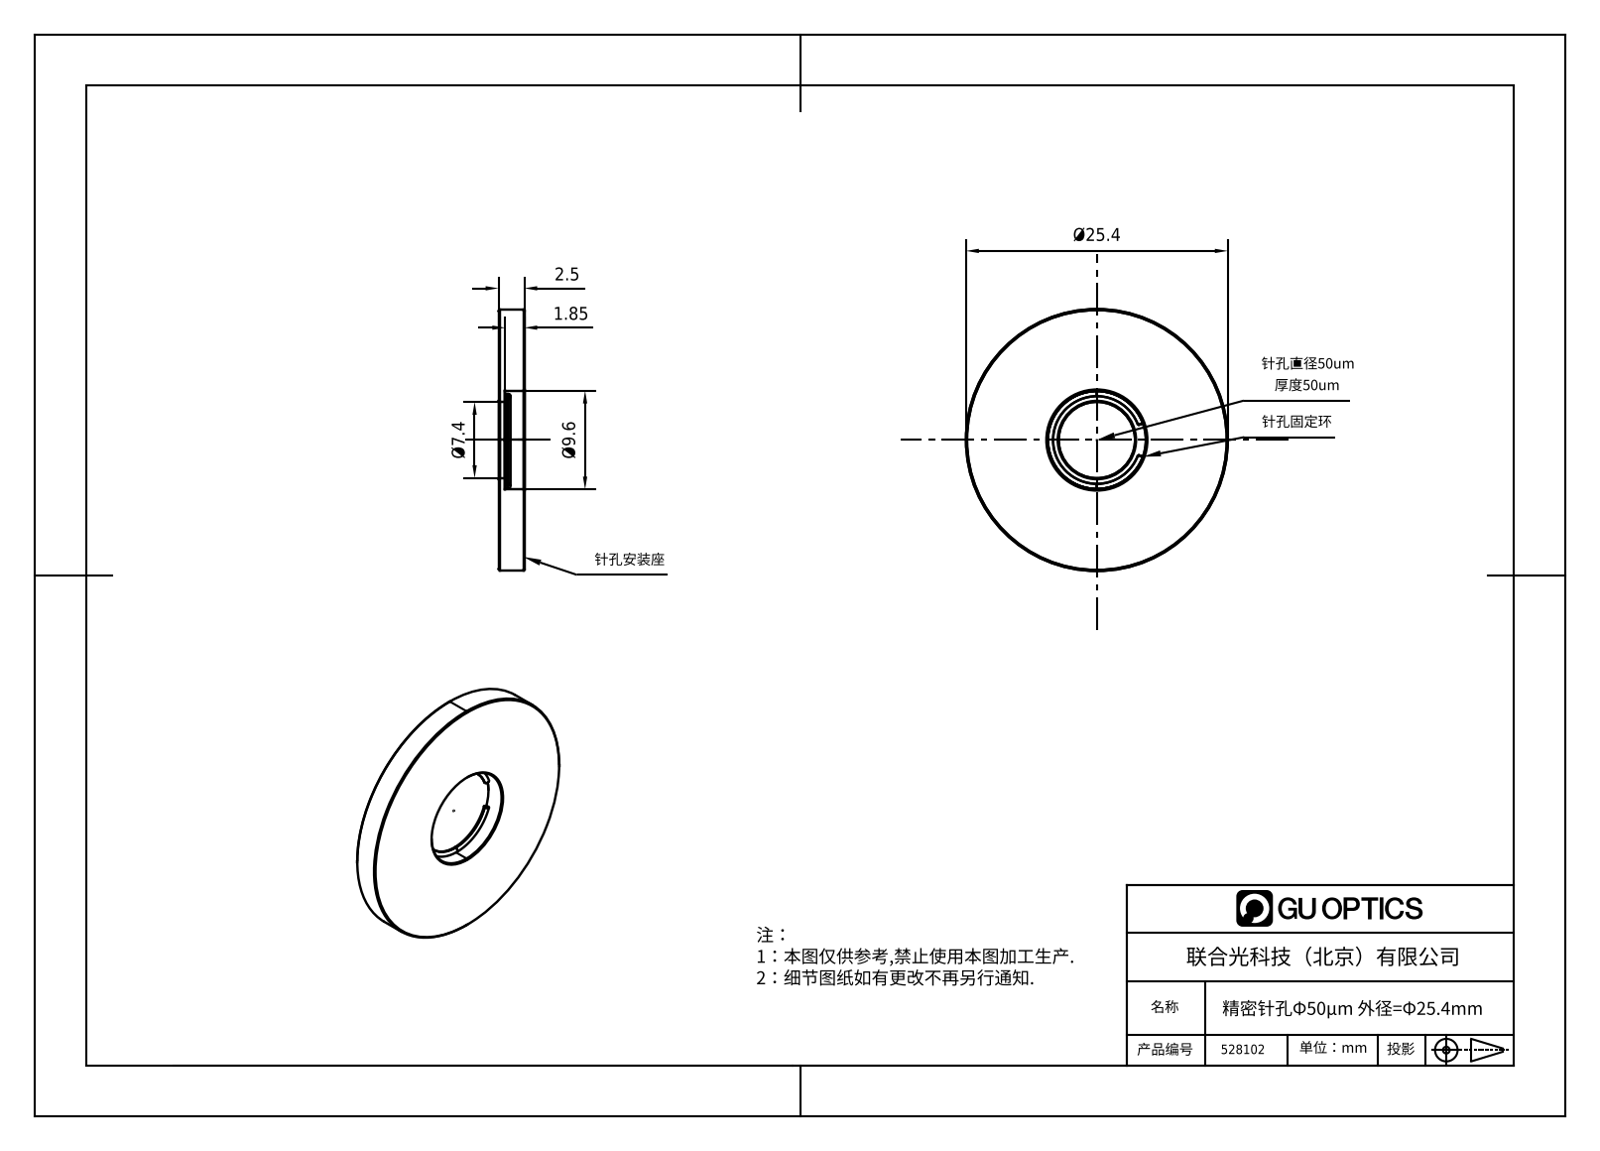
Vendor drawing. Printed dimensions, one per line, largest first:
Ø25.4
Ø9.6
Ø7.4
2.5
1.85
